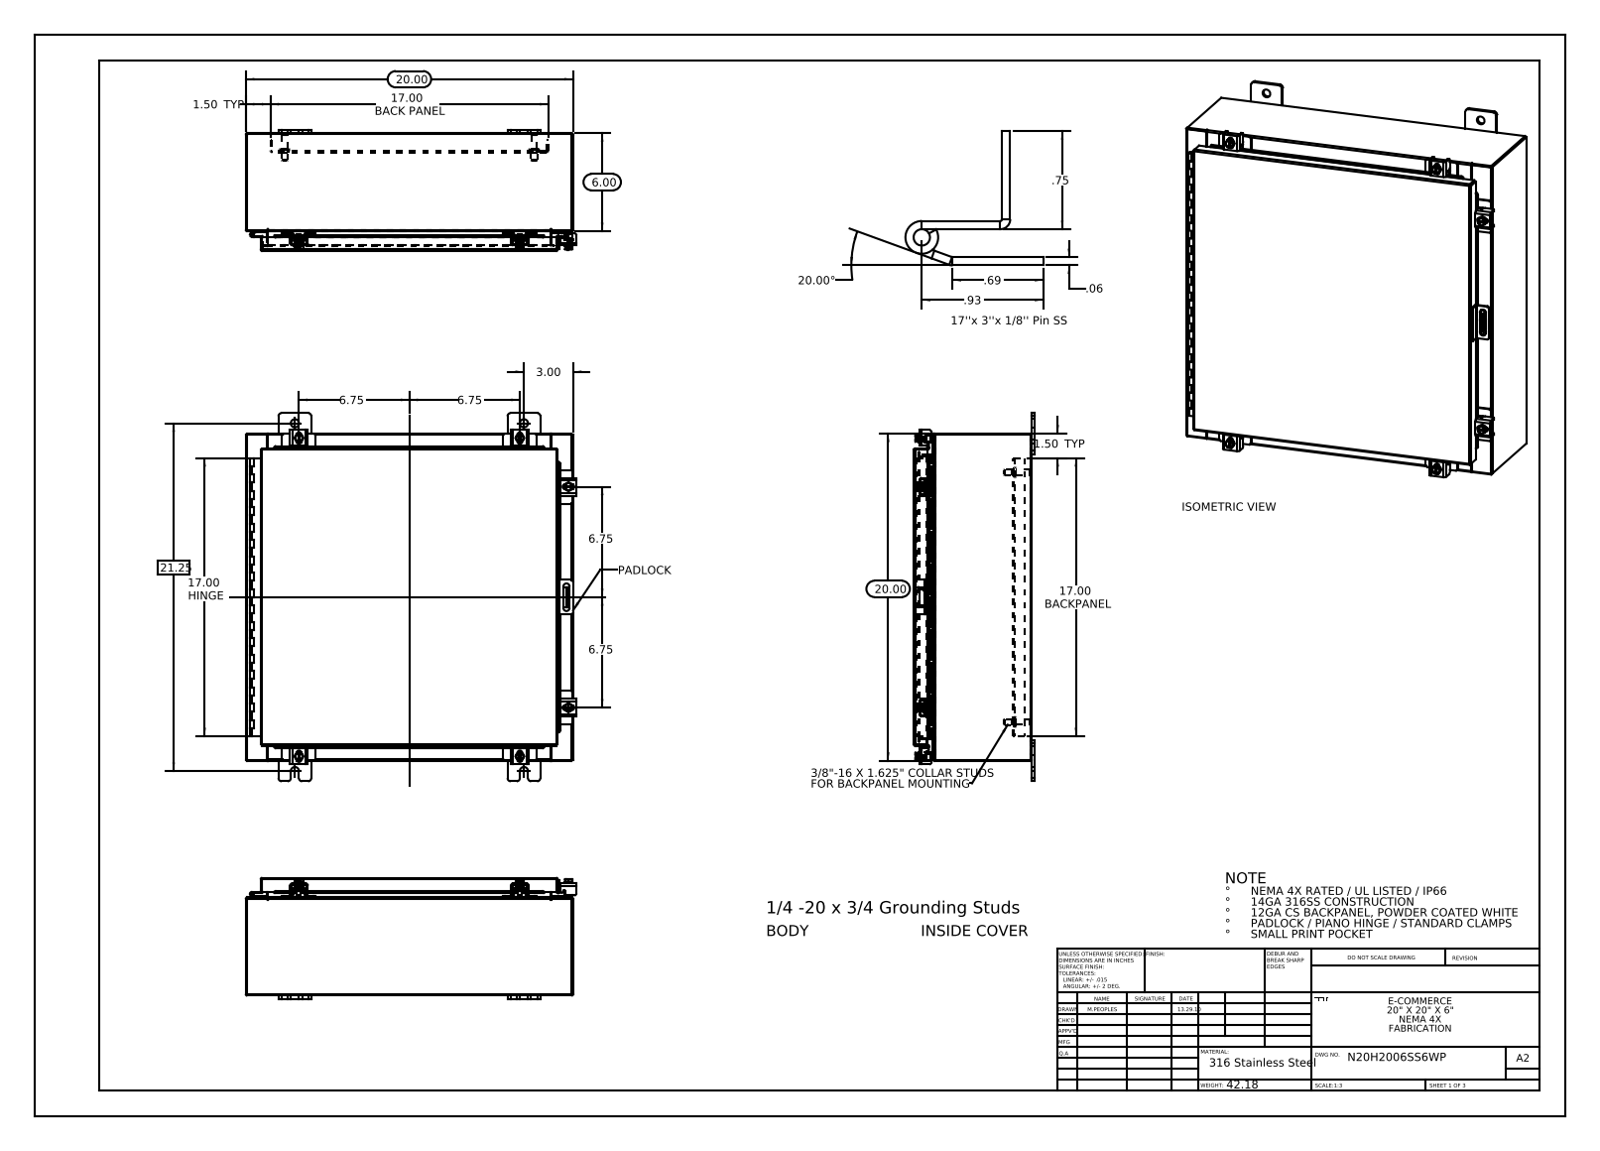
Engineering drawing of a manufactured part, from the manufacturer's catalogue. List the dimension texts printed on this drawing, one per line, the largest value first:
21.25
20.00
20.00
20.00°
17.00 HINGE
17.00 BACK PANEL
17.00 BACKPANEL
6.75
6.75
6.75
6.75
6.00
3.00
1.50 TYP
1.50 TYP
.93
.75
.69
.06
